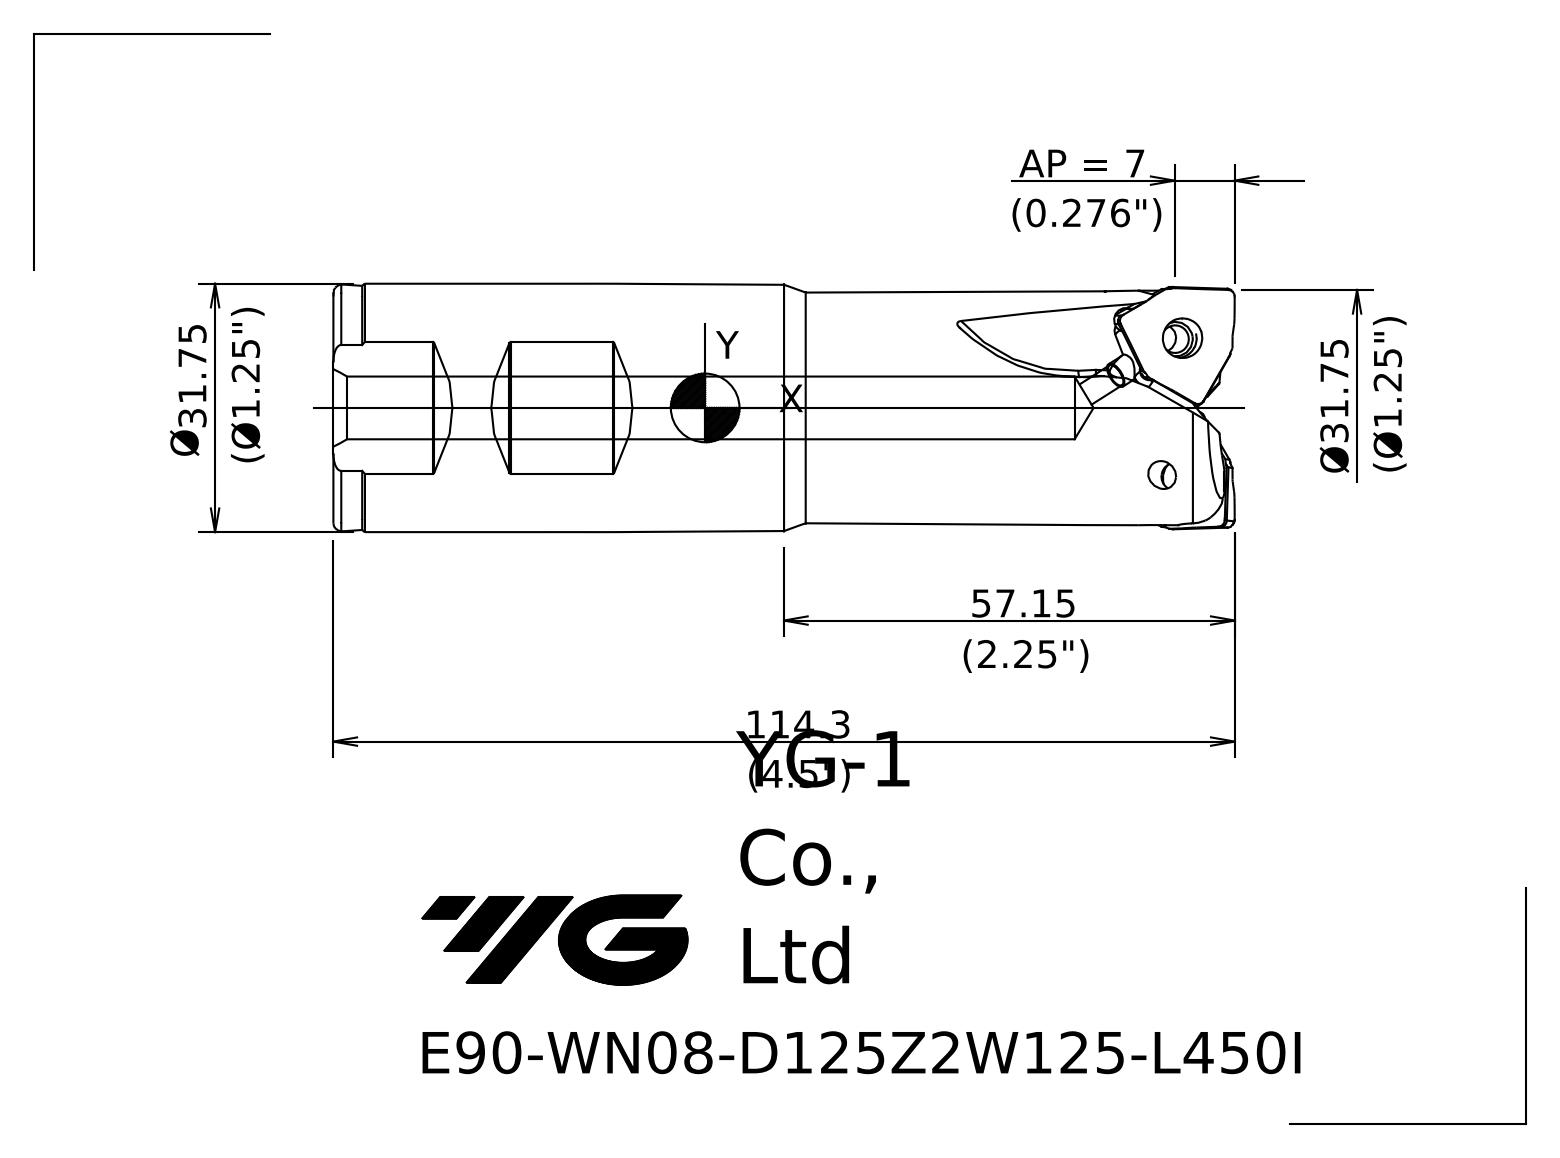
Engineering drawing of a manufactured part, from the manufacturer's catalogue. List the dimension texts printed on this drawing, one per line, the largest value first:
57.15
Ø31.75
31.75 Ø
AP = 7
